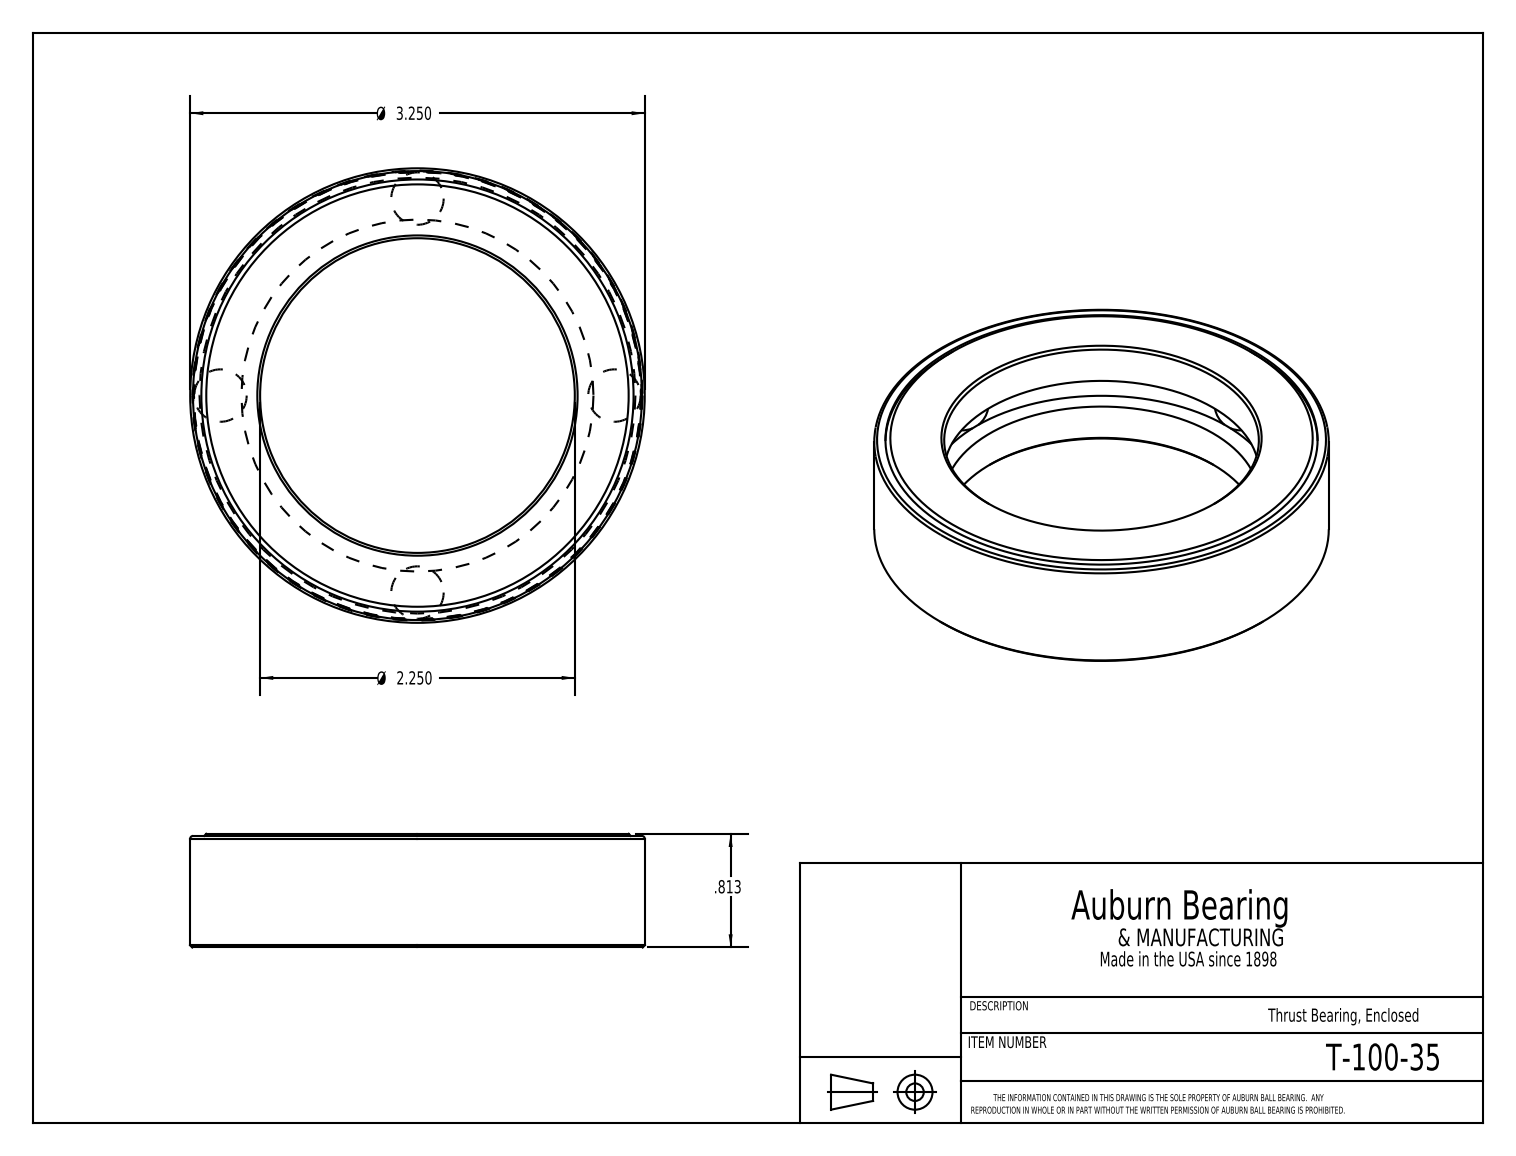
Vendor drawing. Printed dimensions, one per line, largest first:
Ø 3.250
Ø 2.250
.813
